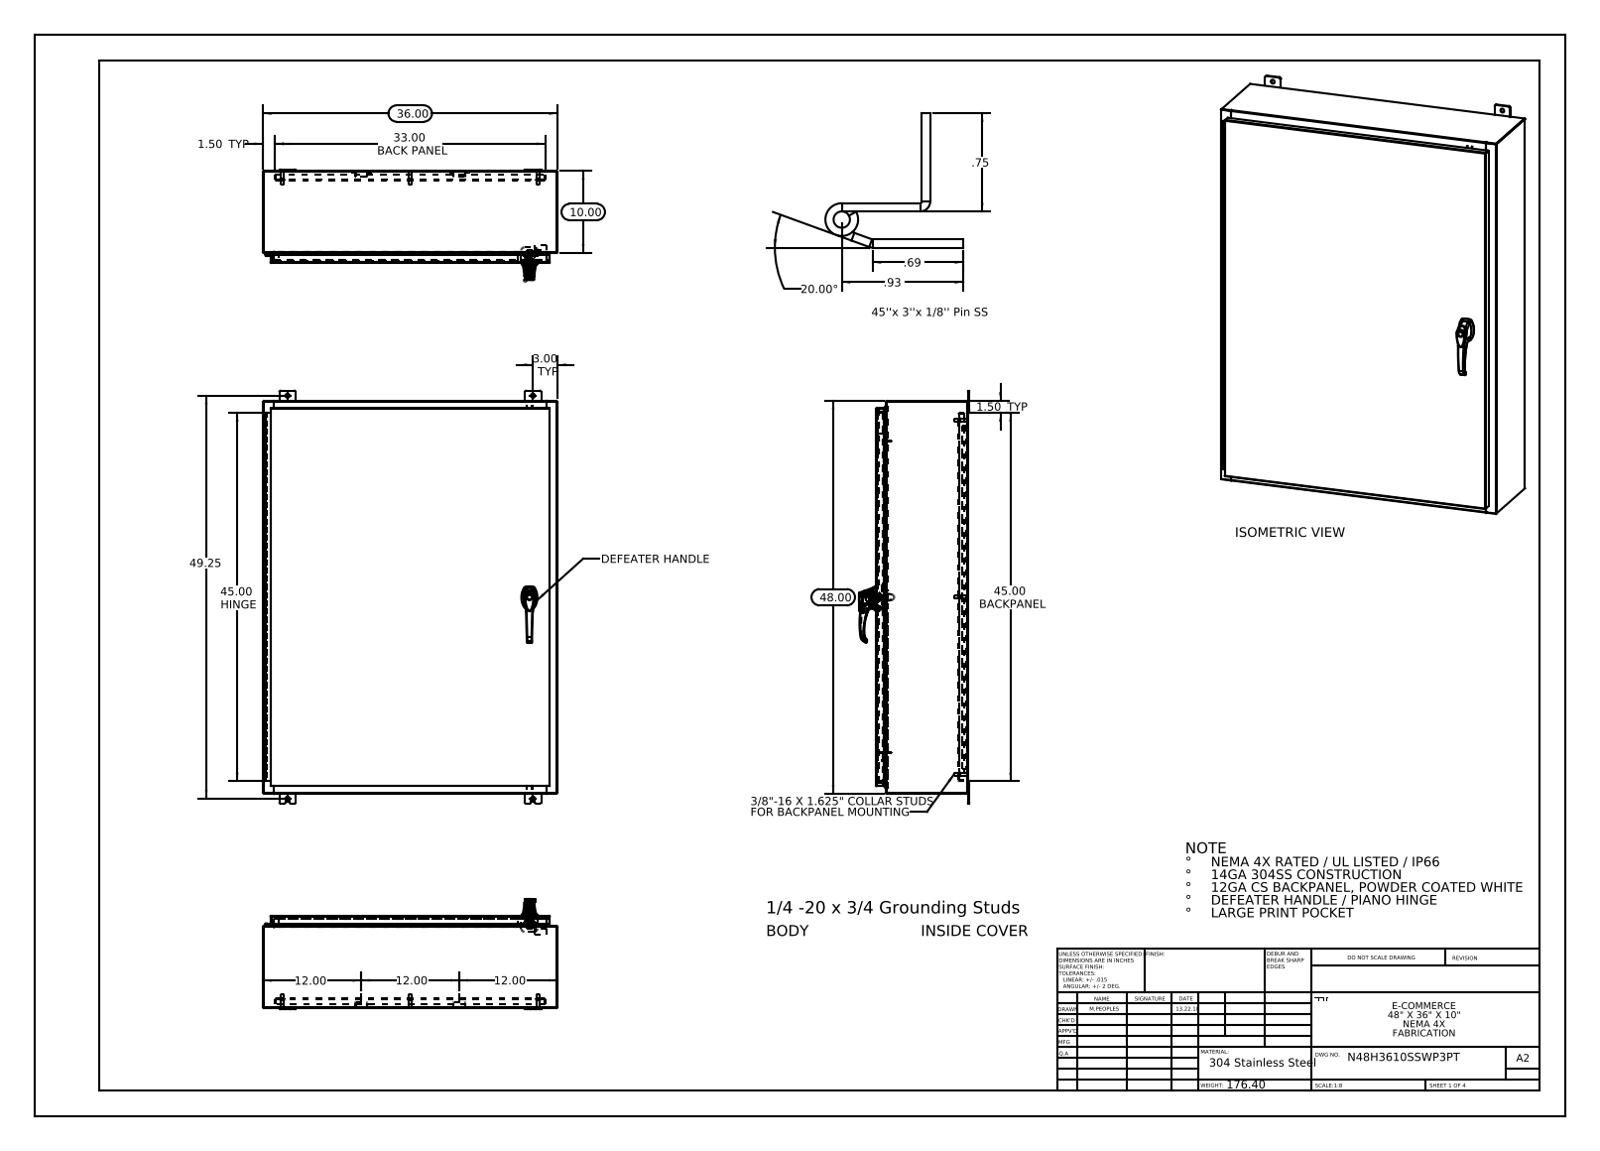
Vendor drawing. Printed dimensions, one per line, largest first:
49.25
48.00
45.00 HINGE
45.00 BACKPANEL
36.00
33.00 BACK PANEL
20.00°
12.00
12.00
12.00
10.00
3.00 TYP
1.50 TYP
1.50 TYP
.93
.75
.69
